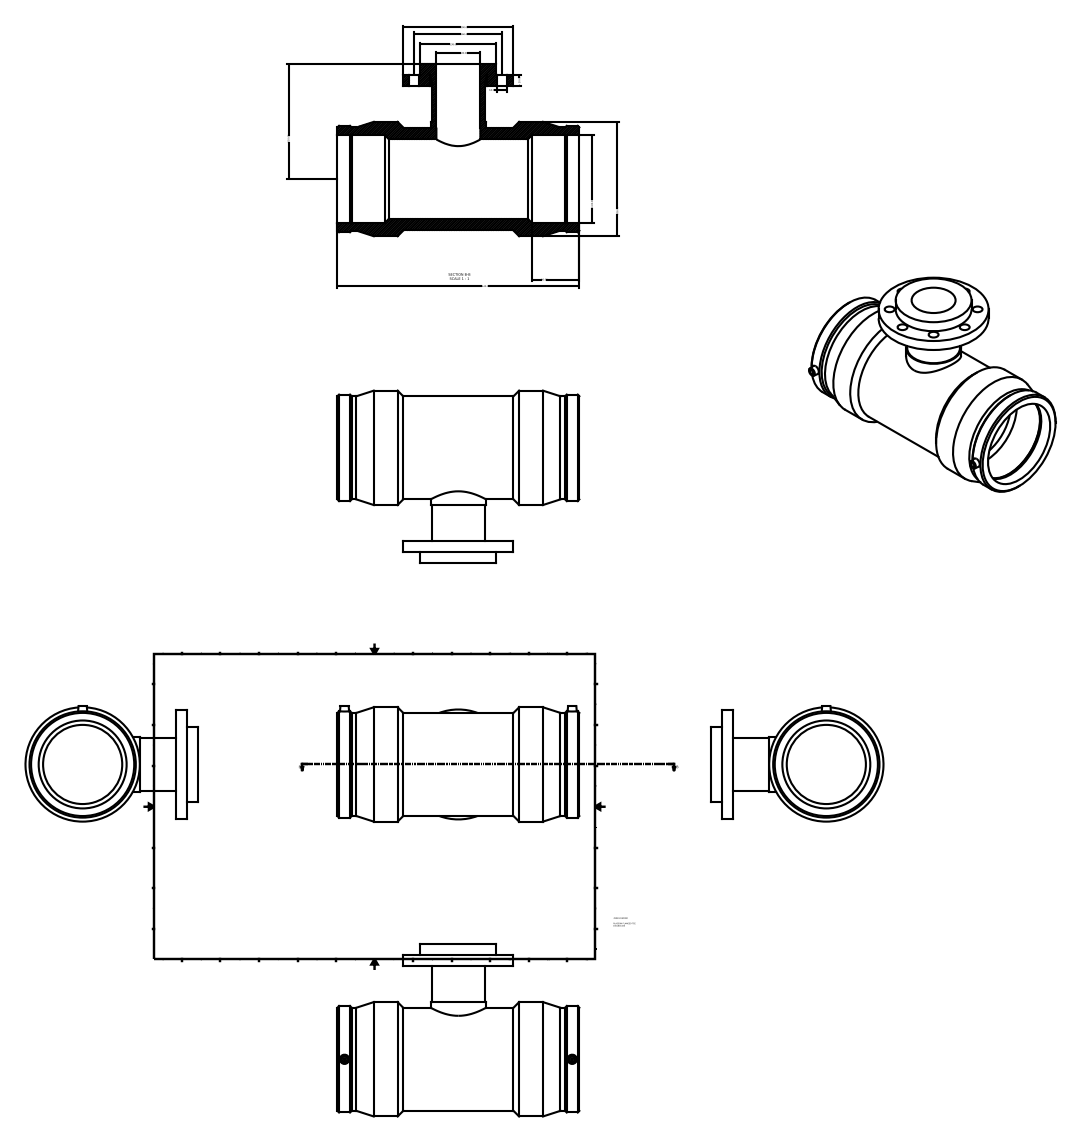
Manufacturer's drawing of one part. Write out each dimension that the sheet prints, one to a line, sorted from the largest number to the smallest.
440.00
210.00
208.00
200.00
n160.00
160.00
138.00
86.00
n80.00
20.00
18.00
